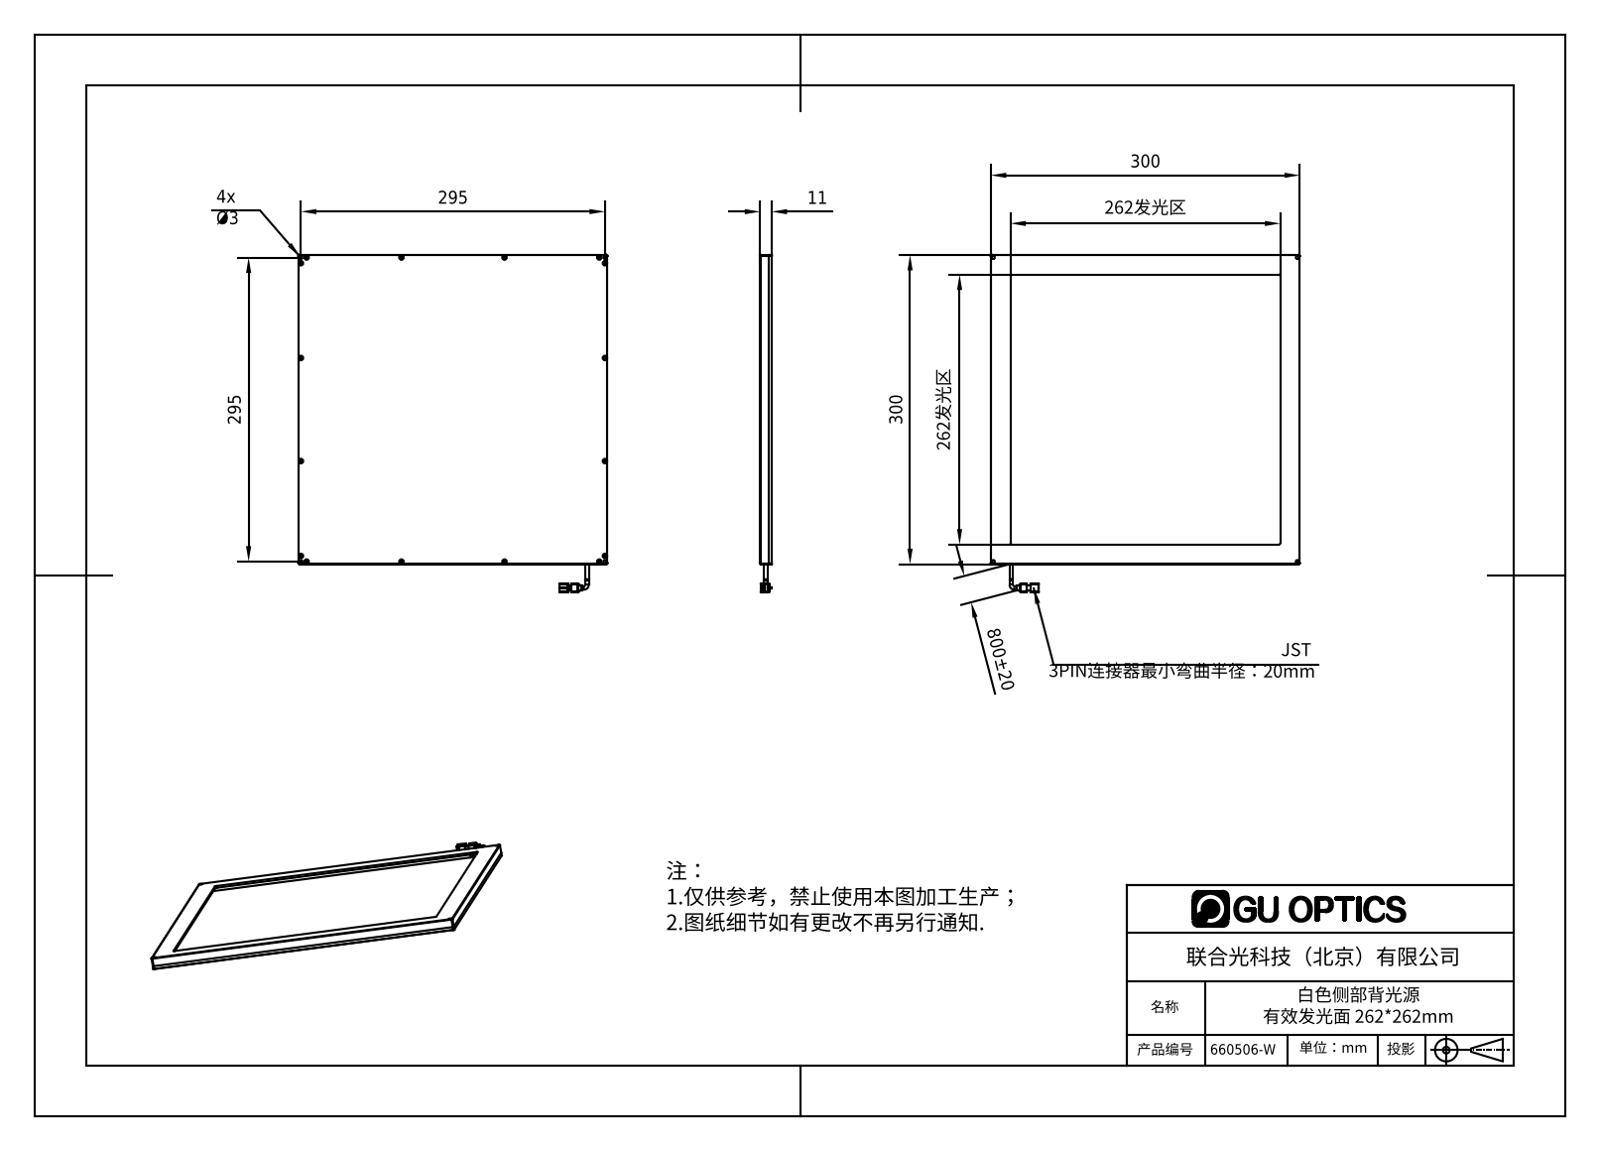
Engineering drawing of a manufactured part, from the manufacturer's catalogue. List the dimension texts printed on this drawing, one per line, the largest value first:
800±20
300
300
295
295
262发光区
262发光区
11
